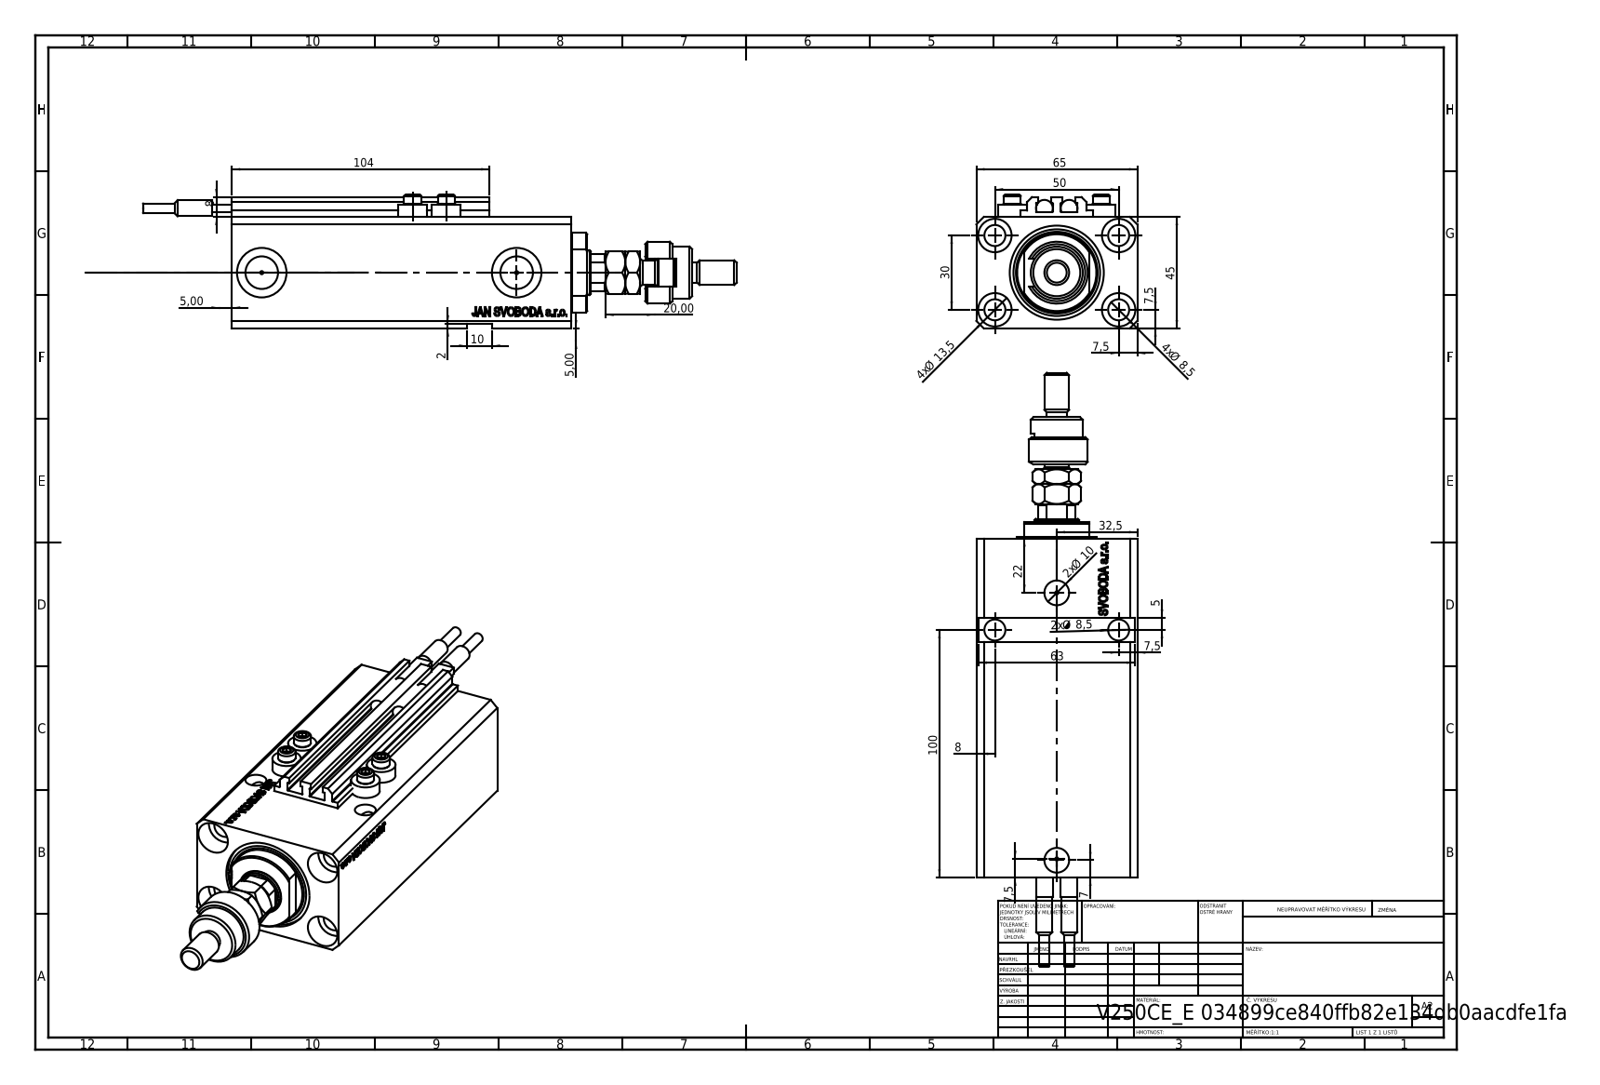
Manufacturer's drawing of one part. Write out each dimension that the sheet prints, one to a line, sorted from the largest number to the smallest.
104
100
65
63
50
45
32,5
30
22
20,00
4x Ø 13,5
10
2x Ø 10
4x Ø 8,5
2x Ø 8,5
8
8
7,5
7,5
7,5
7,5
7
5,00
5,00
5
2
